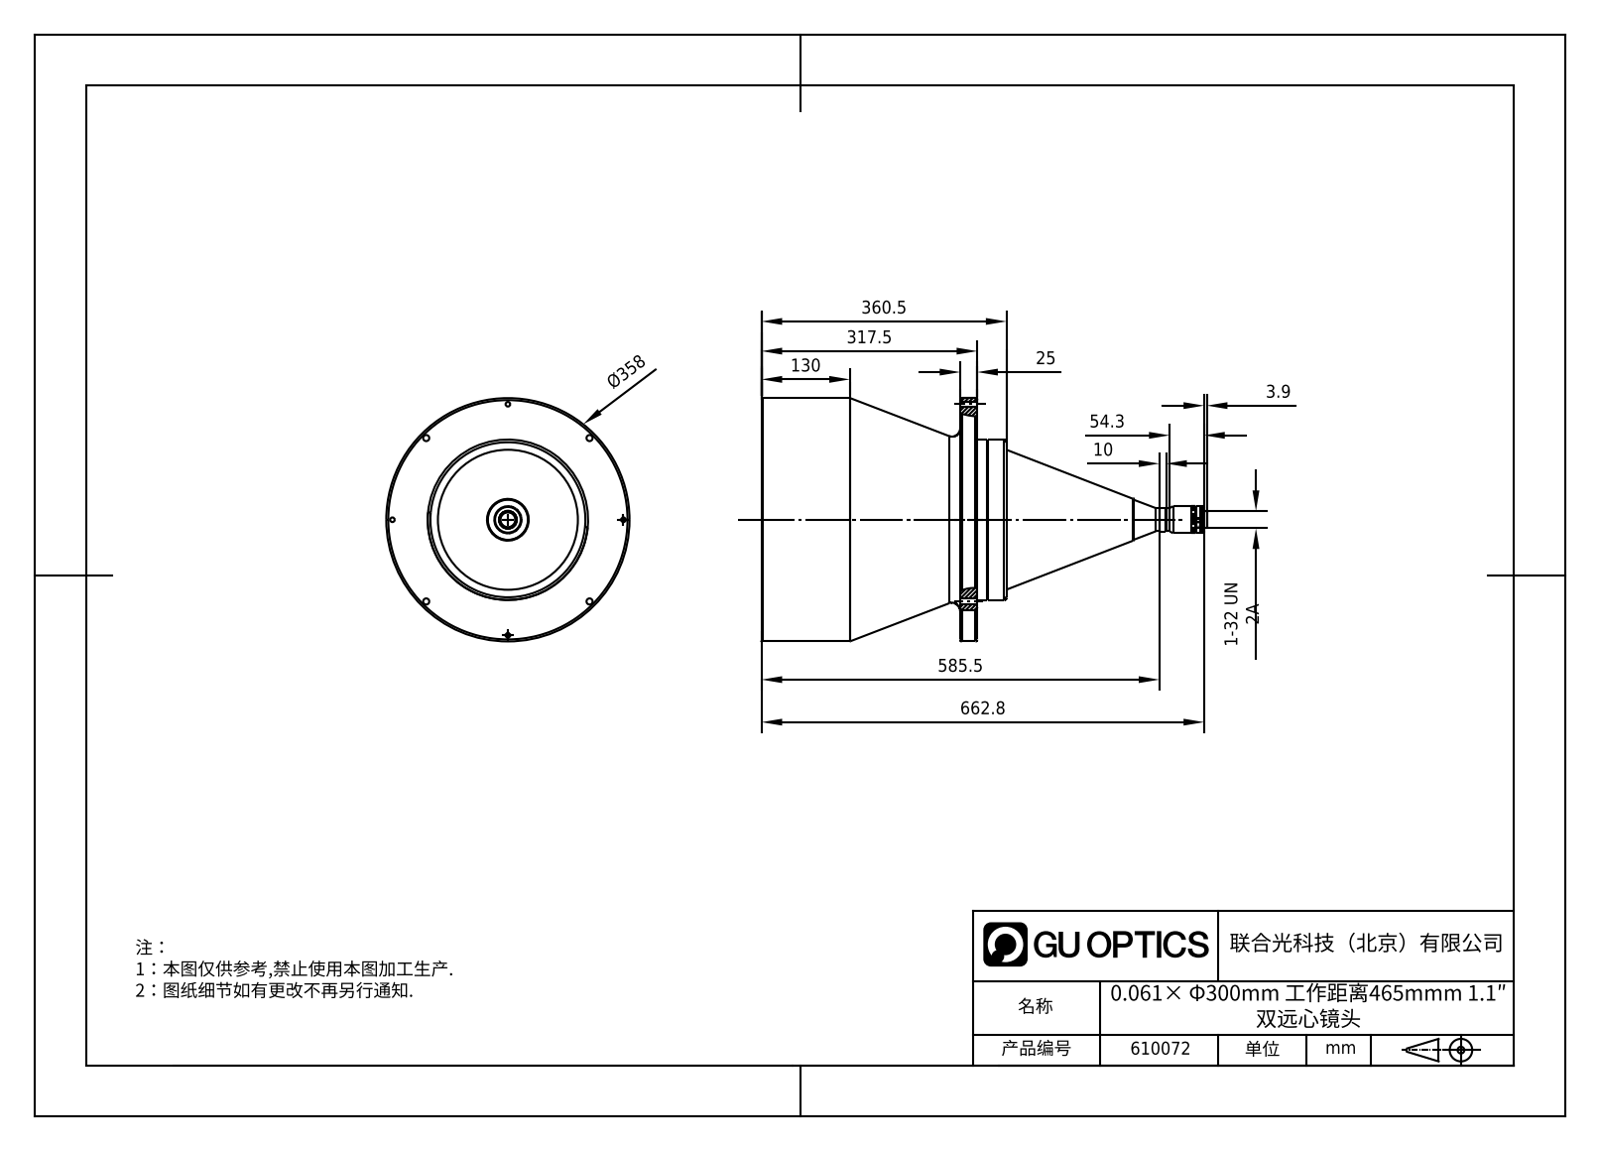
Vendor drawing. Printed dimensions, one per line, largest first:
662.8
585.5
360.5
Ø358
317.5
130
54.3
25
10
3.9
1-32 UN 2A
